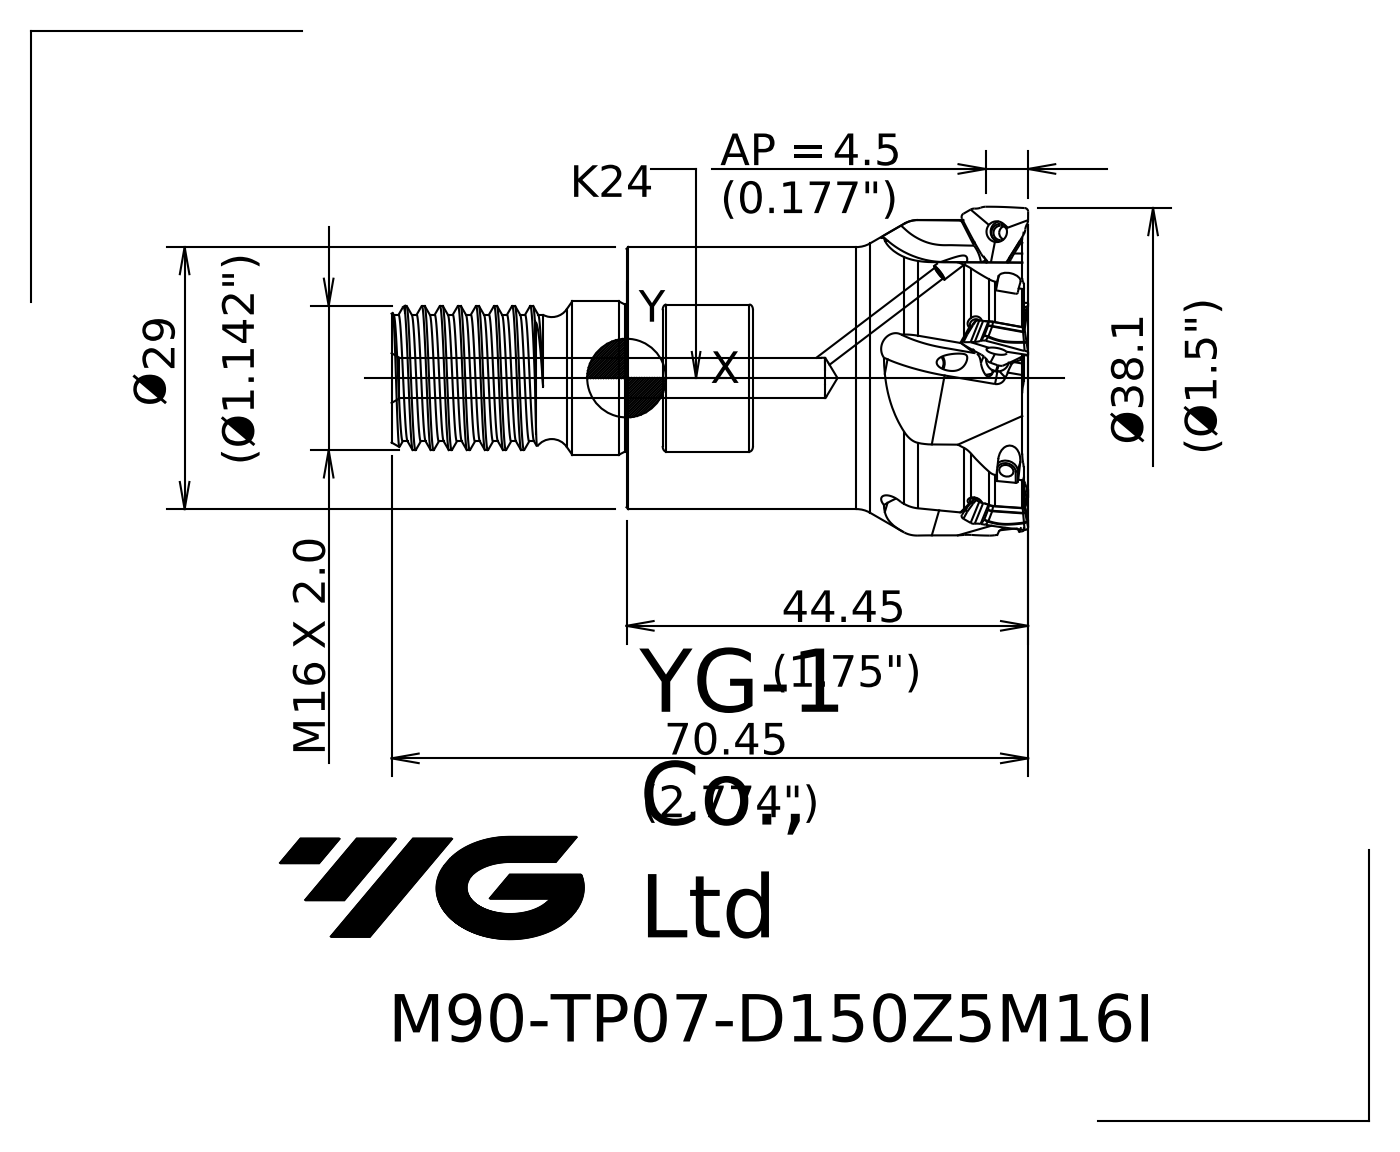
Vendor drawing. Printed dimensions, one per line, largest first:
70.45
44.45
Ø38.1
4.5 AP =
M X 2.0 16
